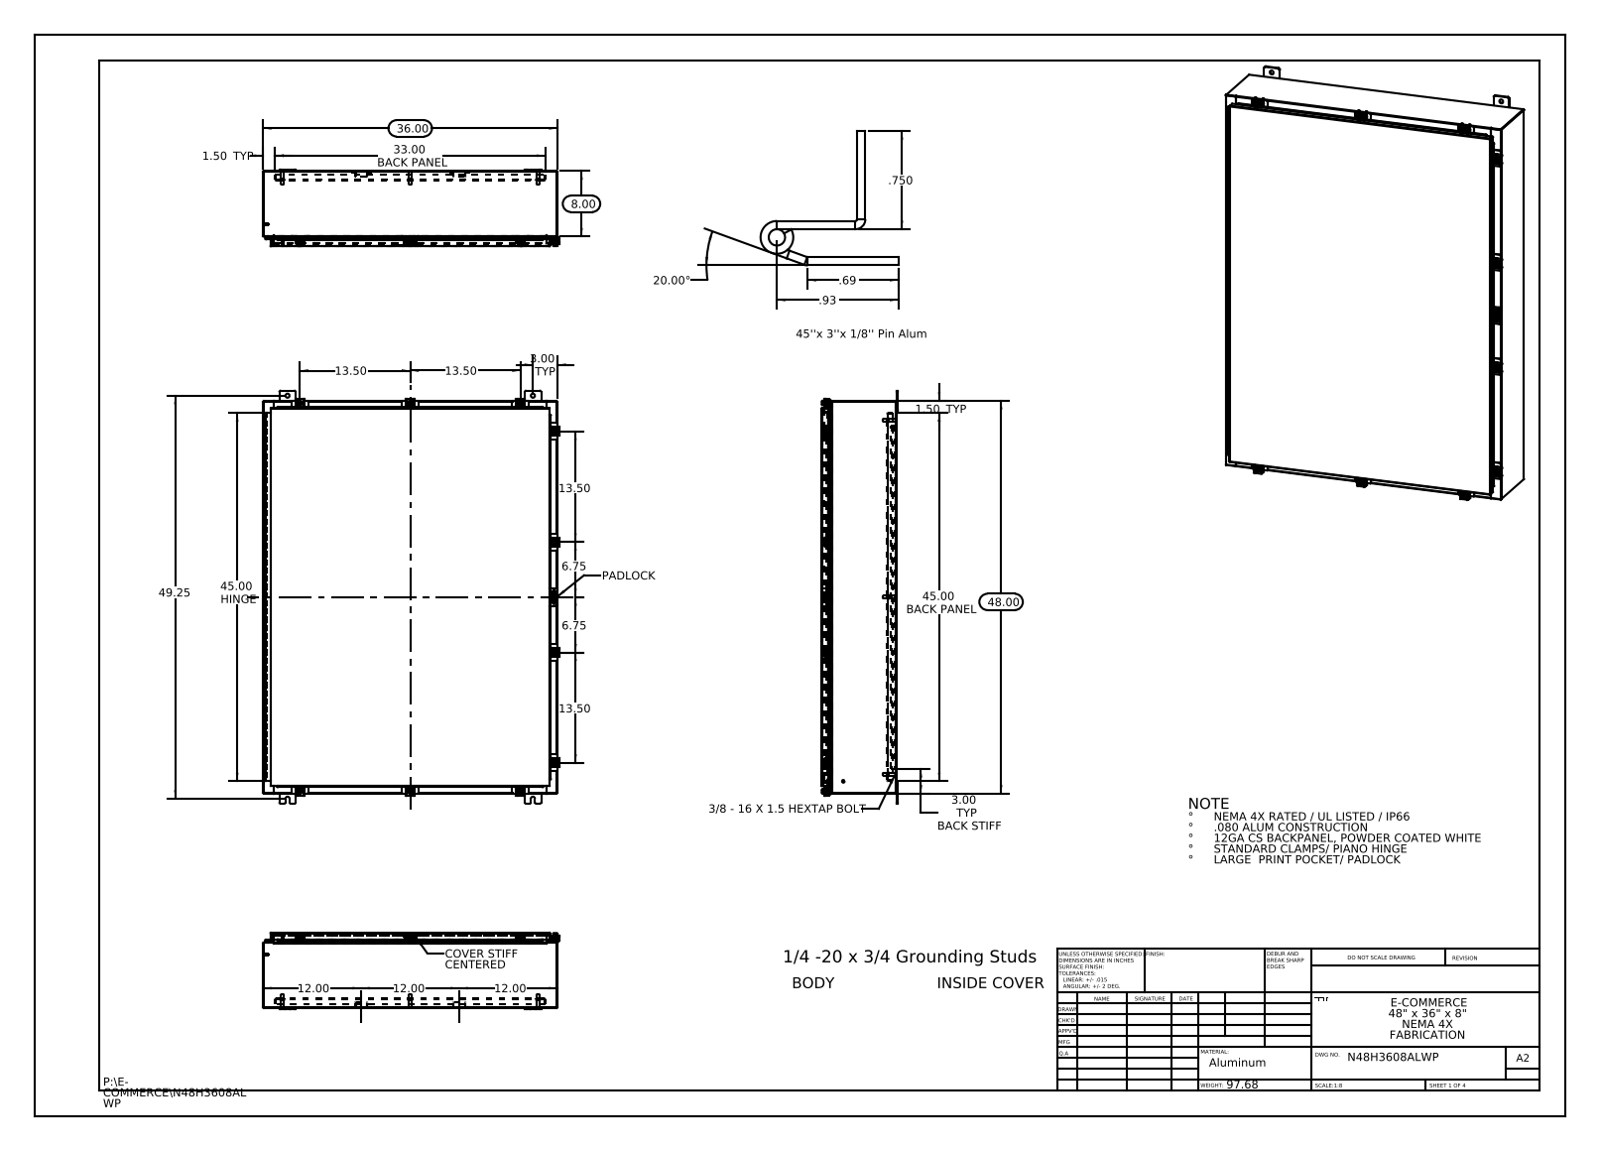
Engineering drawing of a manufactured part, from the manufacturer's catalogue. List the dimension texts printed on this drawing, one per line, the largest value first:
49.25
48.00
45.00 HINGE
45.00 BACK PANEL
36.00
33.00 BACK PANEL
20.00°
13.50
13.50
13.50
13.50
12.00
12.00
12.00
8.00
6.75
6.75
3.00 TYP
3.00 TYP BACK STIFF
1.50 TYP
1.50 TYP
.93
.750
.69
